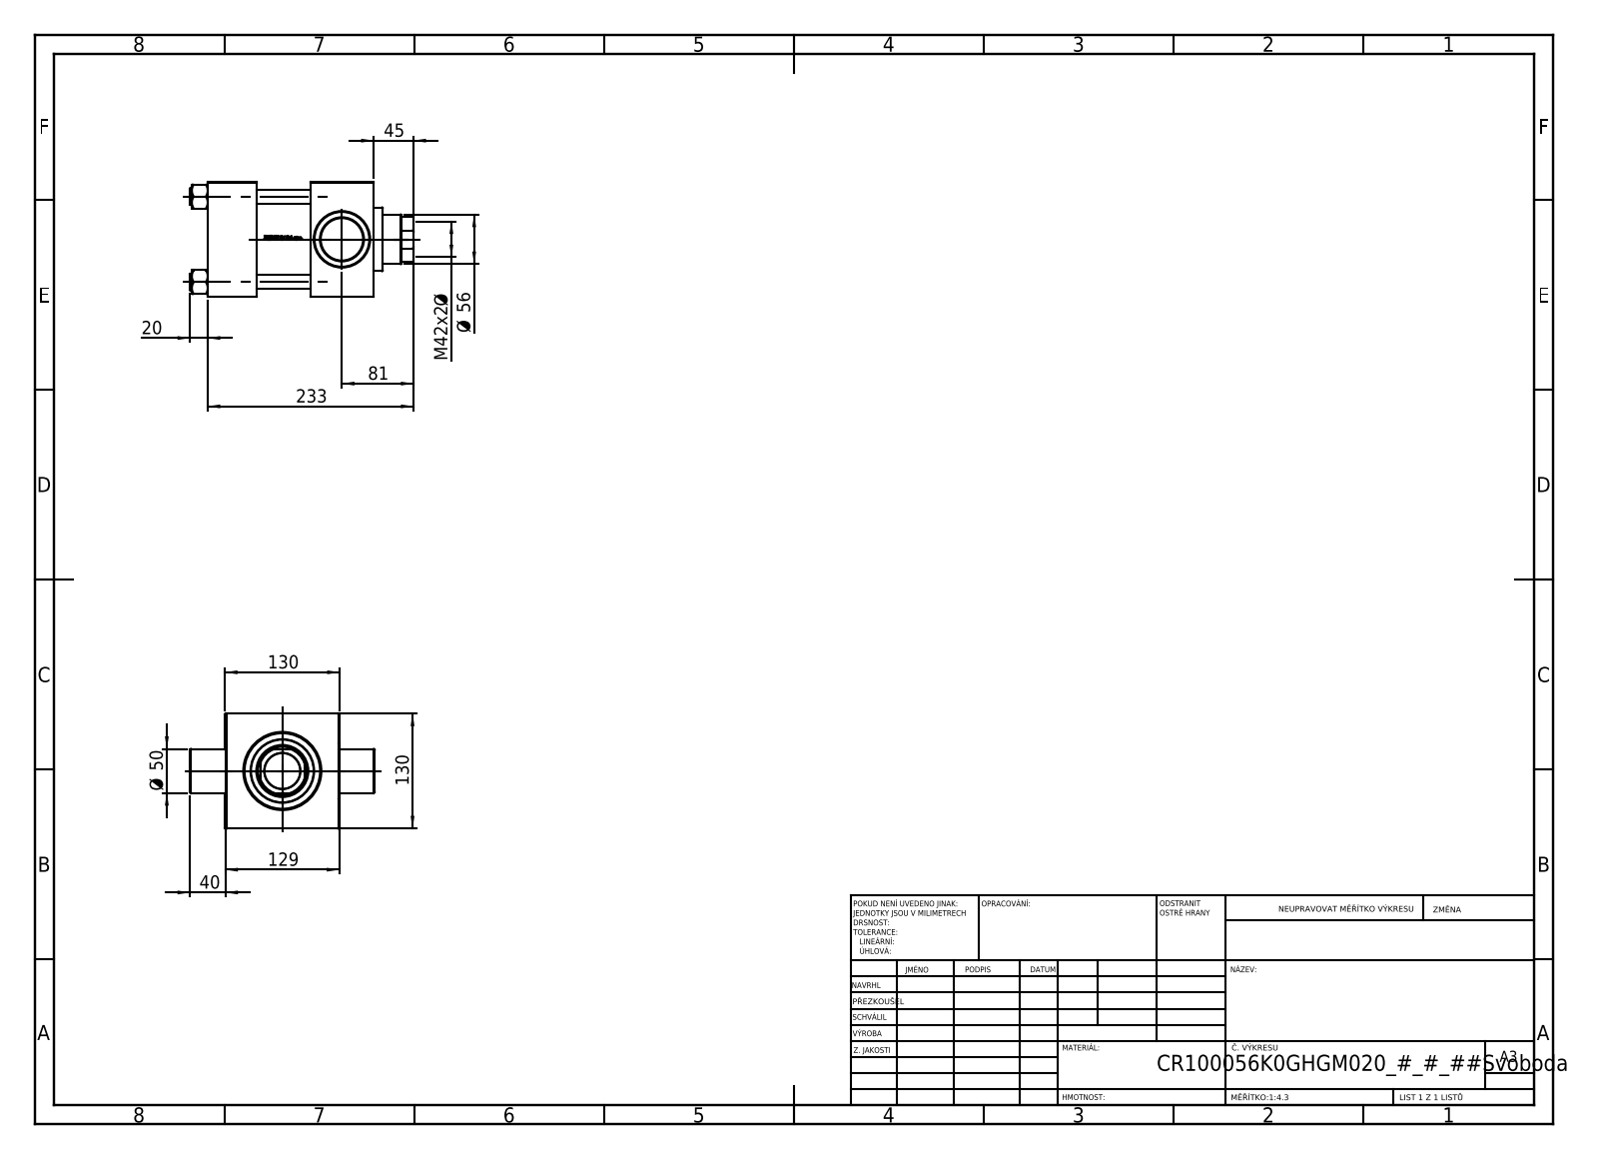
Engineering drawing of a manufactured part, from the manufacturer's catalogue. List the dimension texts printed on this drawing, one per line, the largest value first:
233
130
130
129
81
Ø 56
Ø 50
45
M42x2 Ø
40
20
